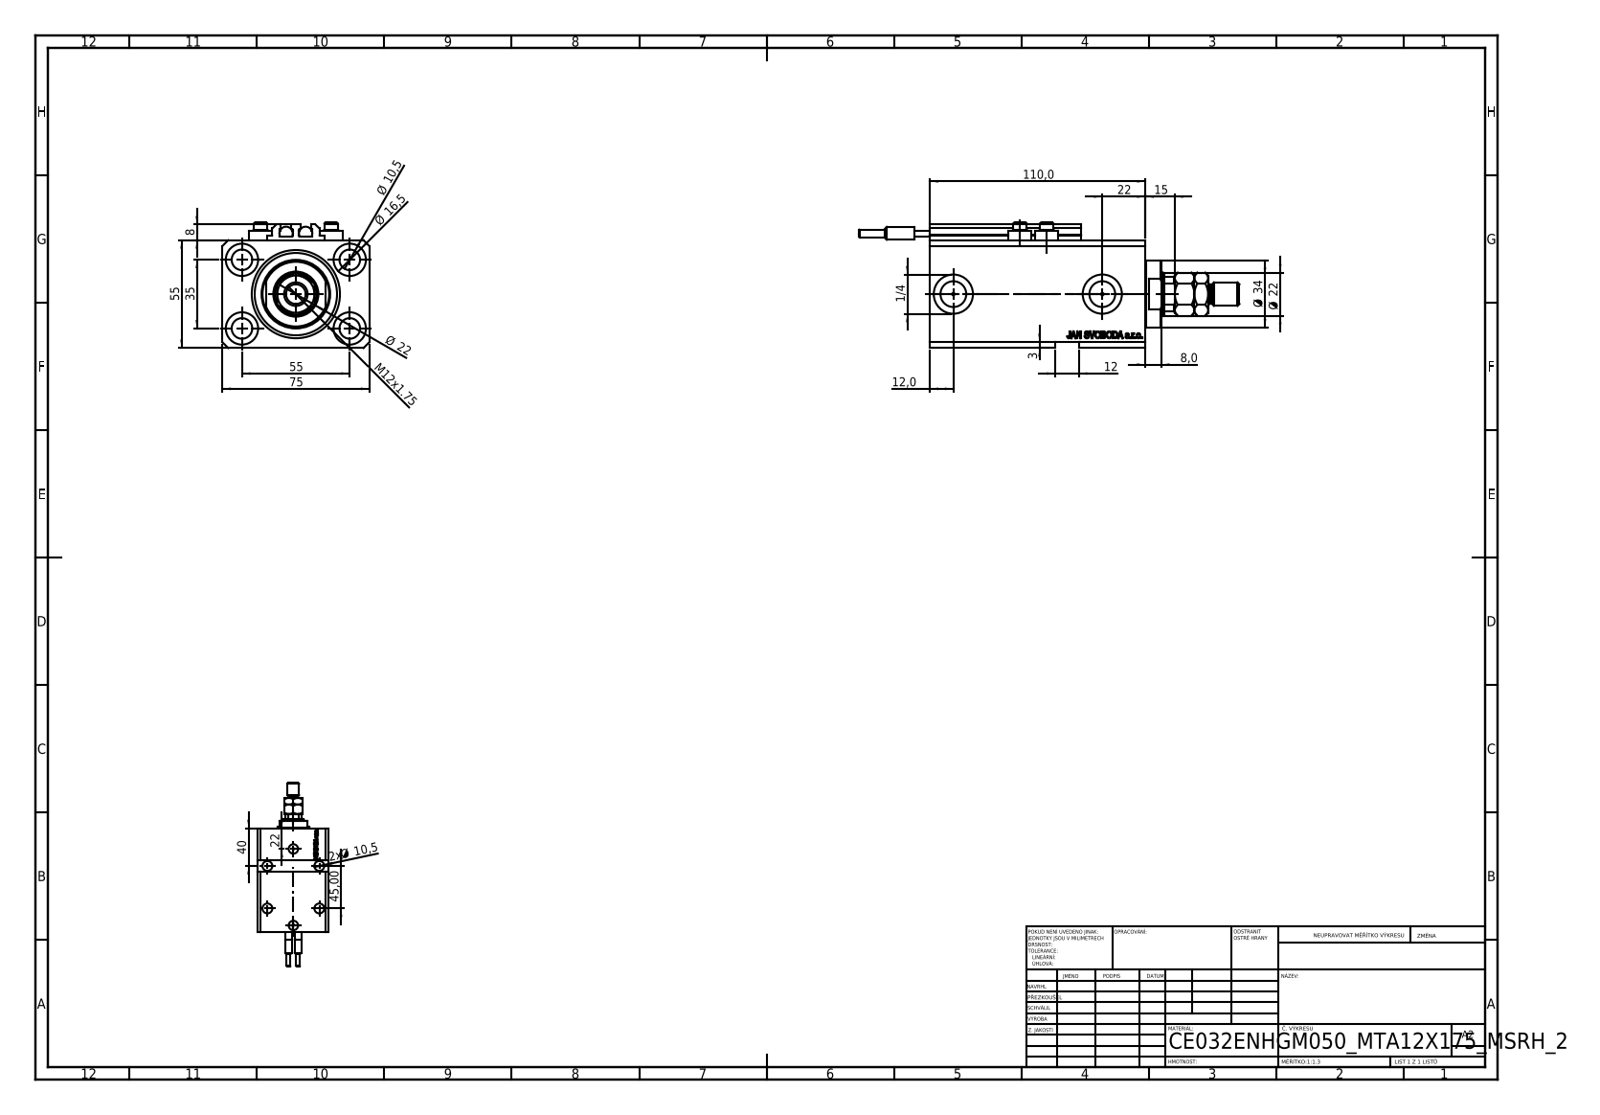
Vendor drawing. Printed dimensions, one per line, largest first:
110,0
75
55
55
45,00
40
35
Ø 34
Ø 22
22
Ø 22
22
Ø 16,5
15
M12x1.75
12,0
12
Ø 10,5
2x Ø 10,5
8
8,0
3
1/4
